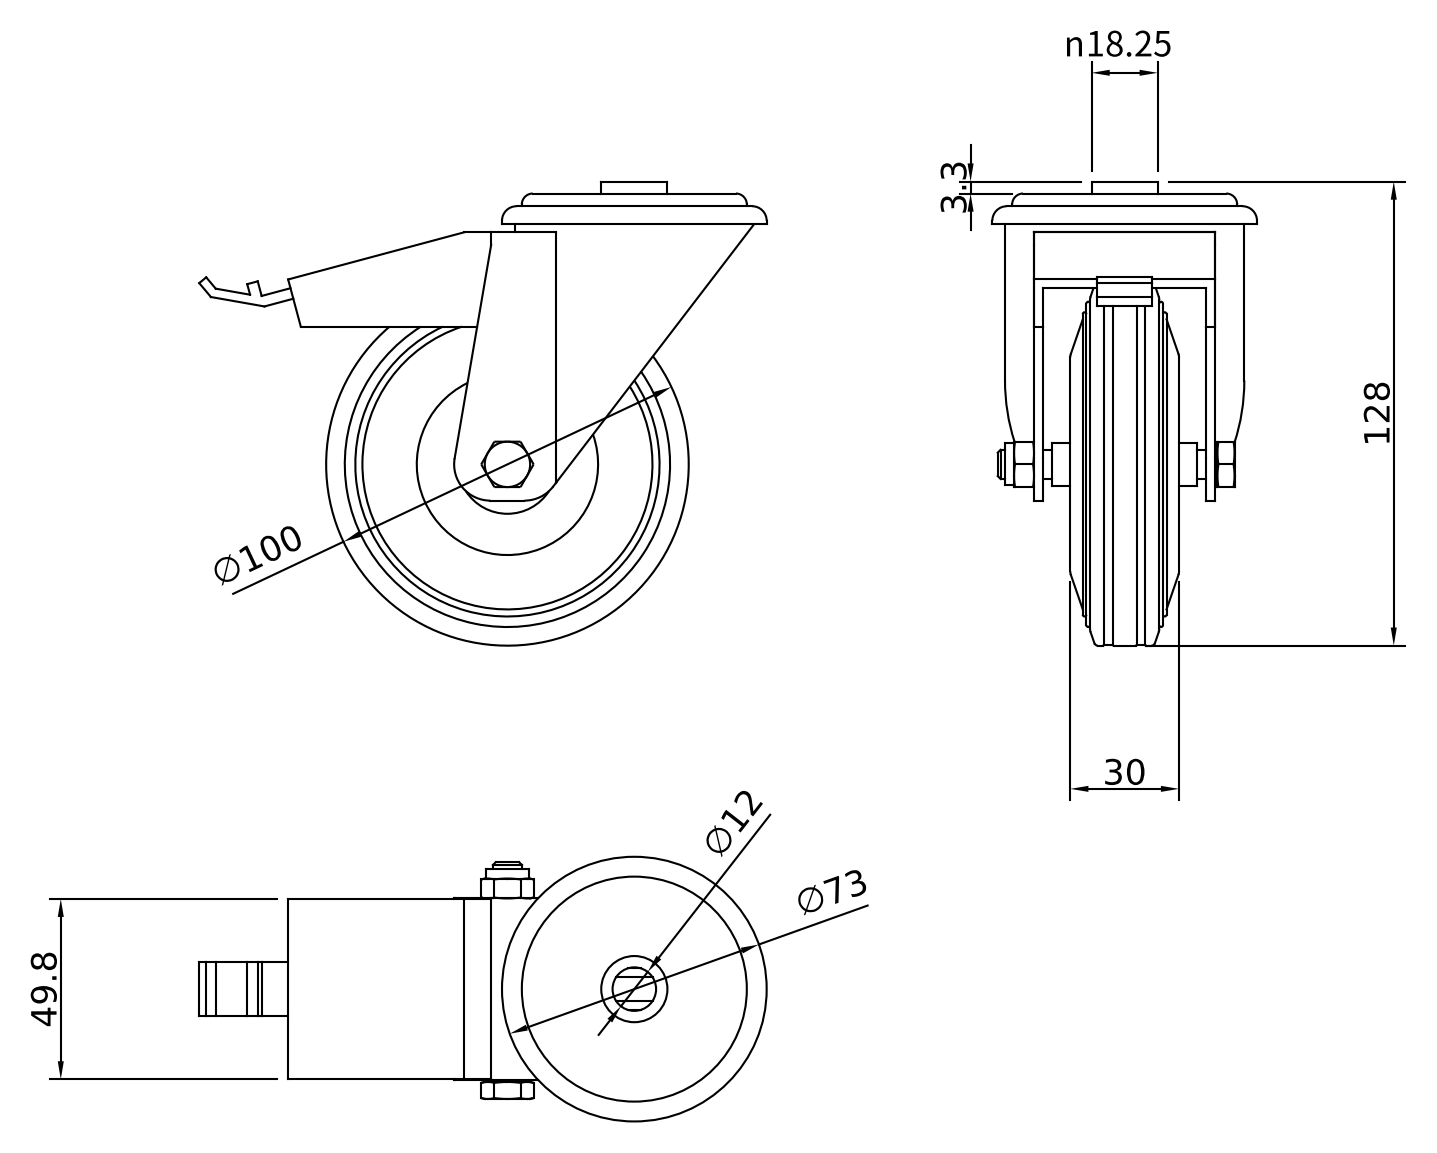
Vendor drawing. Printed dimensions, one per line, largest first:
128
∅100
∅73
49.8
30
n18.25
∅12
3.3
